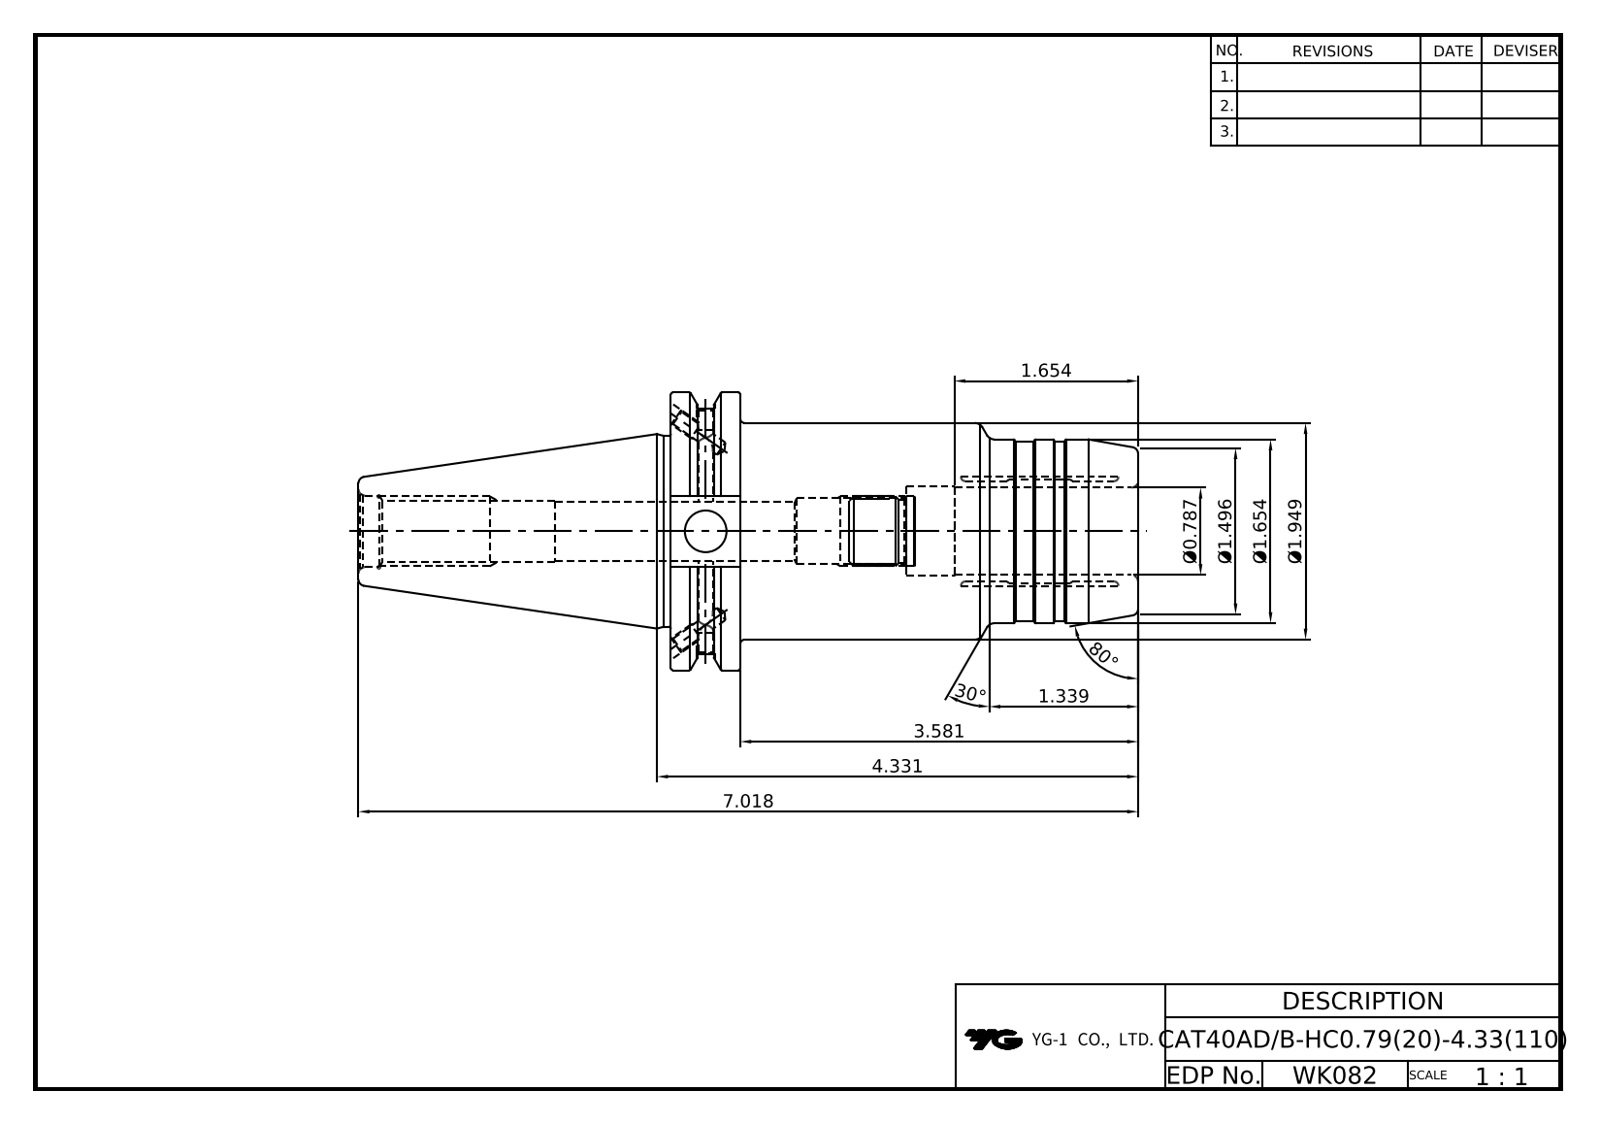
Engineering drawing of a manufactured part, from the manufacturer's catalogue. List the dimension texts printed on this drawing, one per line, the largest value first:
80°
30°
7.018
4.331
3.581
Ø1.949
Ø1.654
1.654
Ø1.496
1.339
Ø0.787
